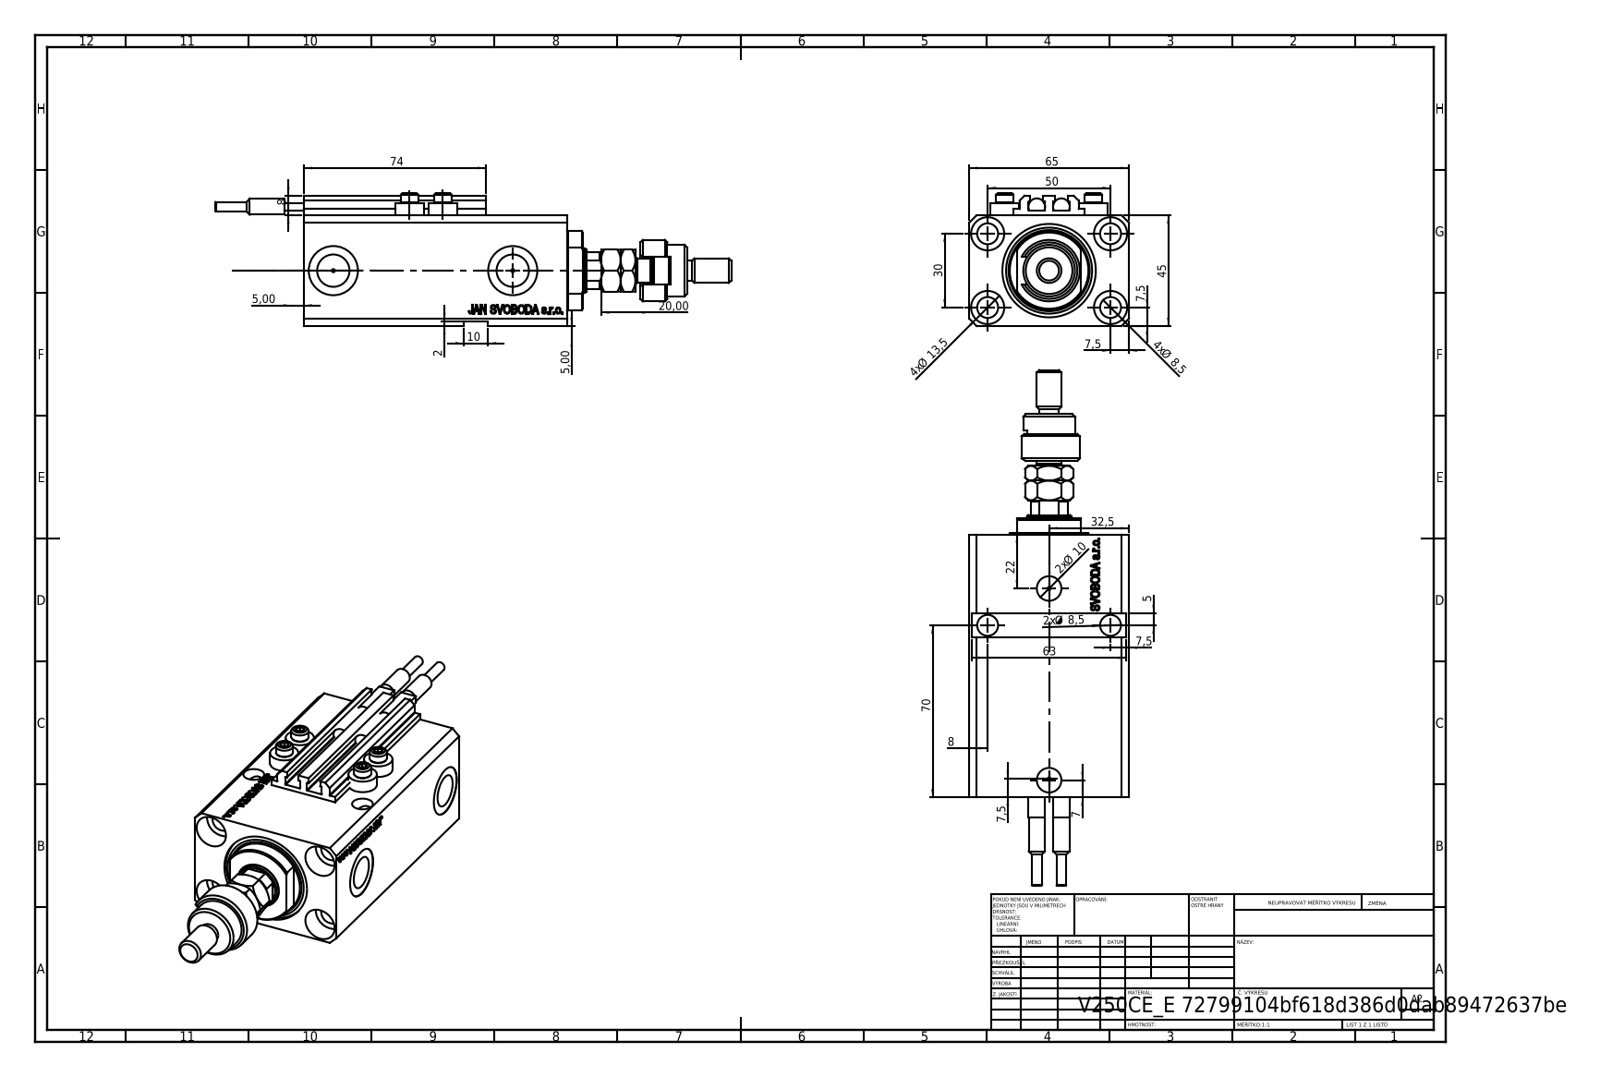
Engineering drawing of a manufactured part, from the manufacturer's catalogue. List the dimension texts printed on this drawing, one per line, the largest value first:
74
70
65
63
50
45
32,5
30
22
20,00
4x Ø 13,5
10
2x Ø 10
4x Ø 8,5
2x Ø 8,5
8
8
7,5
7,5
7,5
7,5
7
5,00
5,00
5
2
